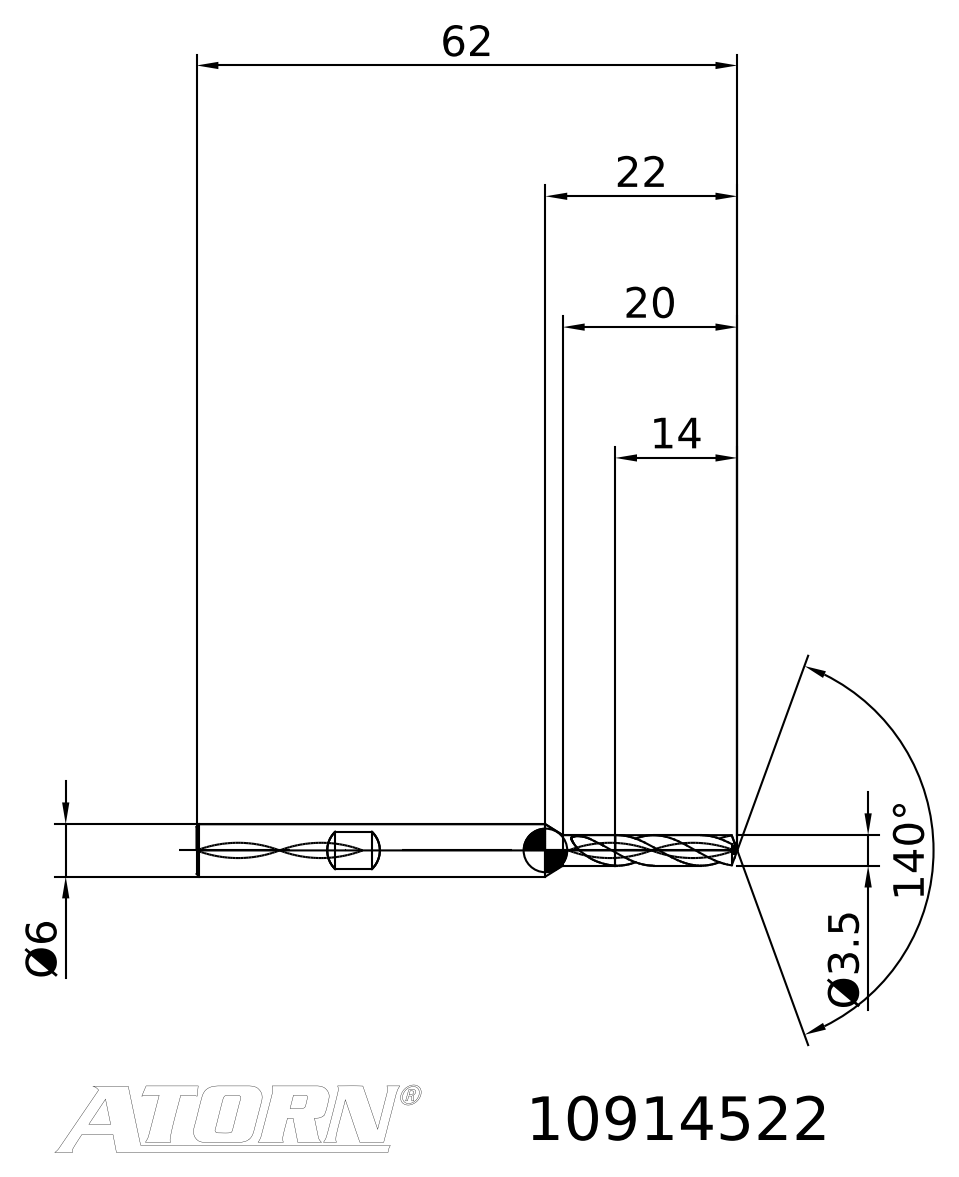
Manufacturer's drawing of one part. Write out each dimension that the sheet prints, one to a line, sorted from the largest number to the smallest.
140°
62
22
20
14
Ø6
Ø3.5
